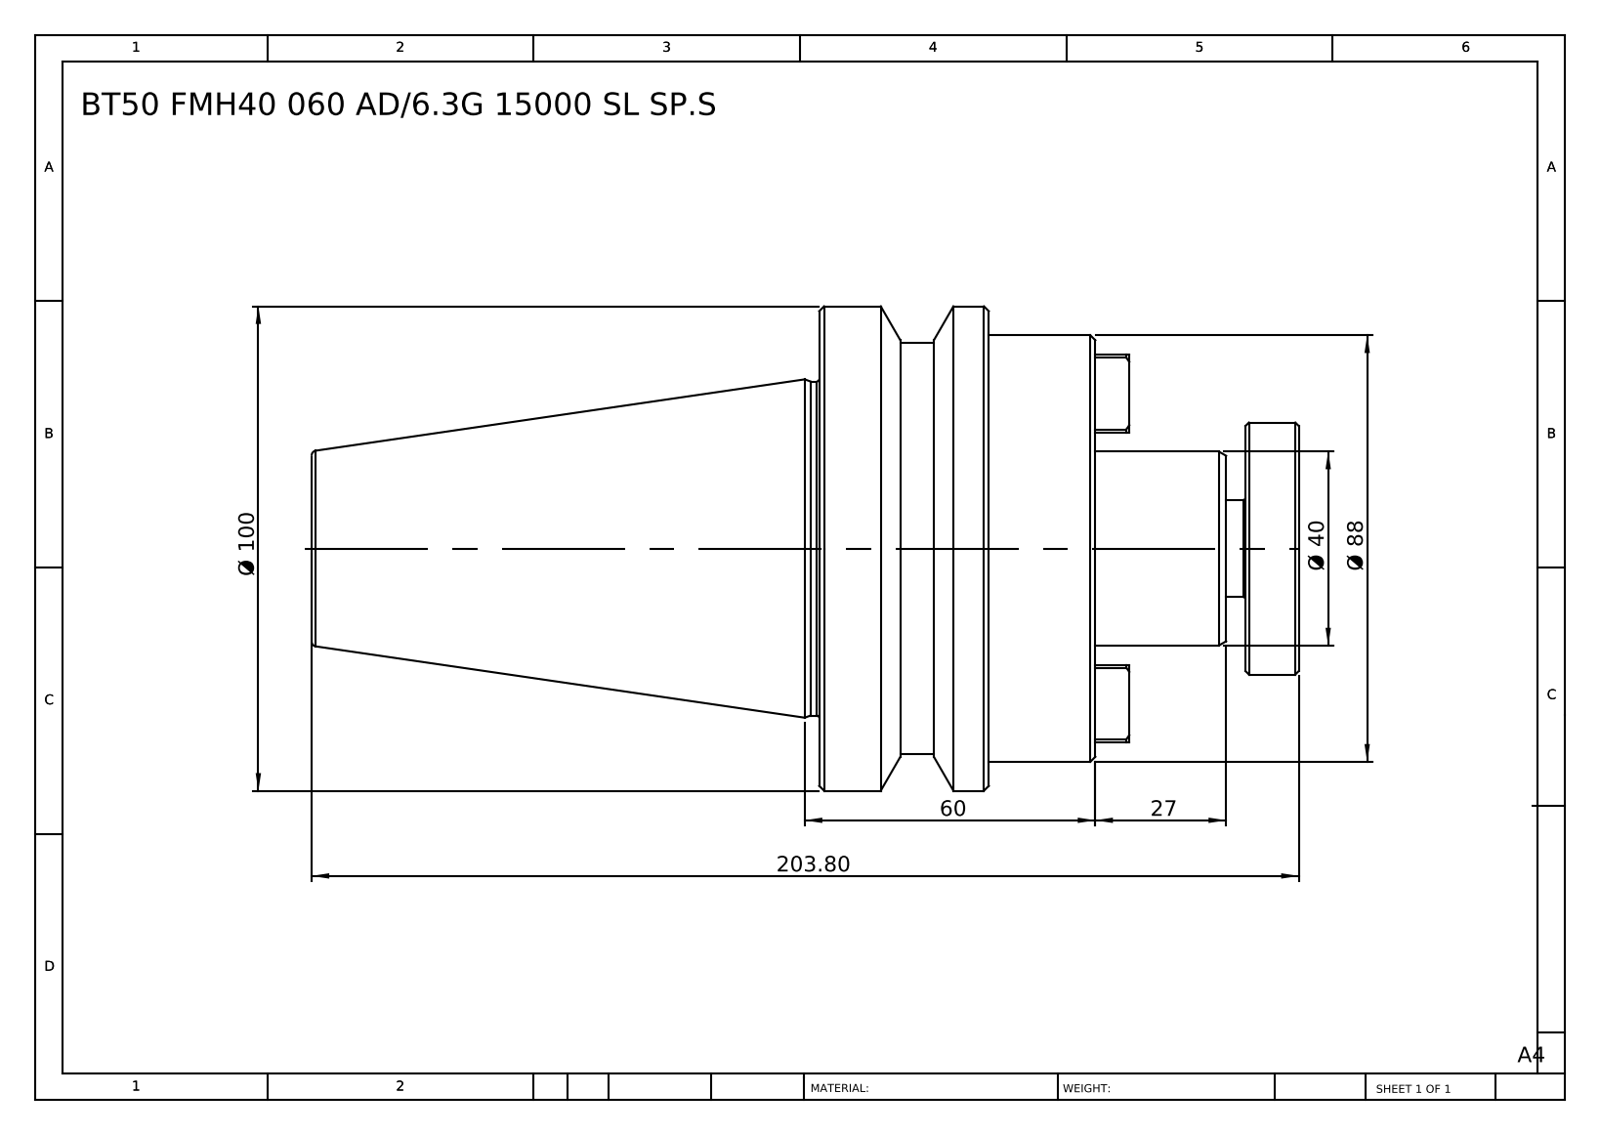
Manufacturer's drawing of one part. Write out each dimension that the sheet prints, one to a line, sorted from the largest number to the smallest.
203.80
Ø 100
Ø 88
60
Ø 40
27
